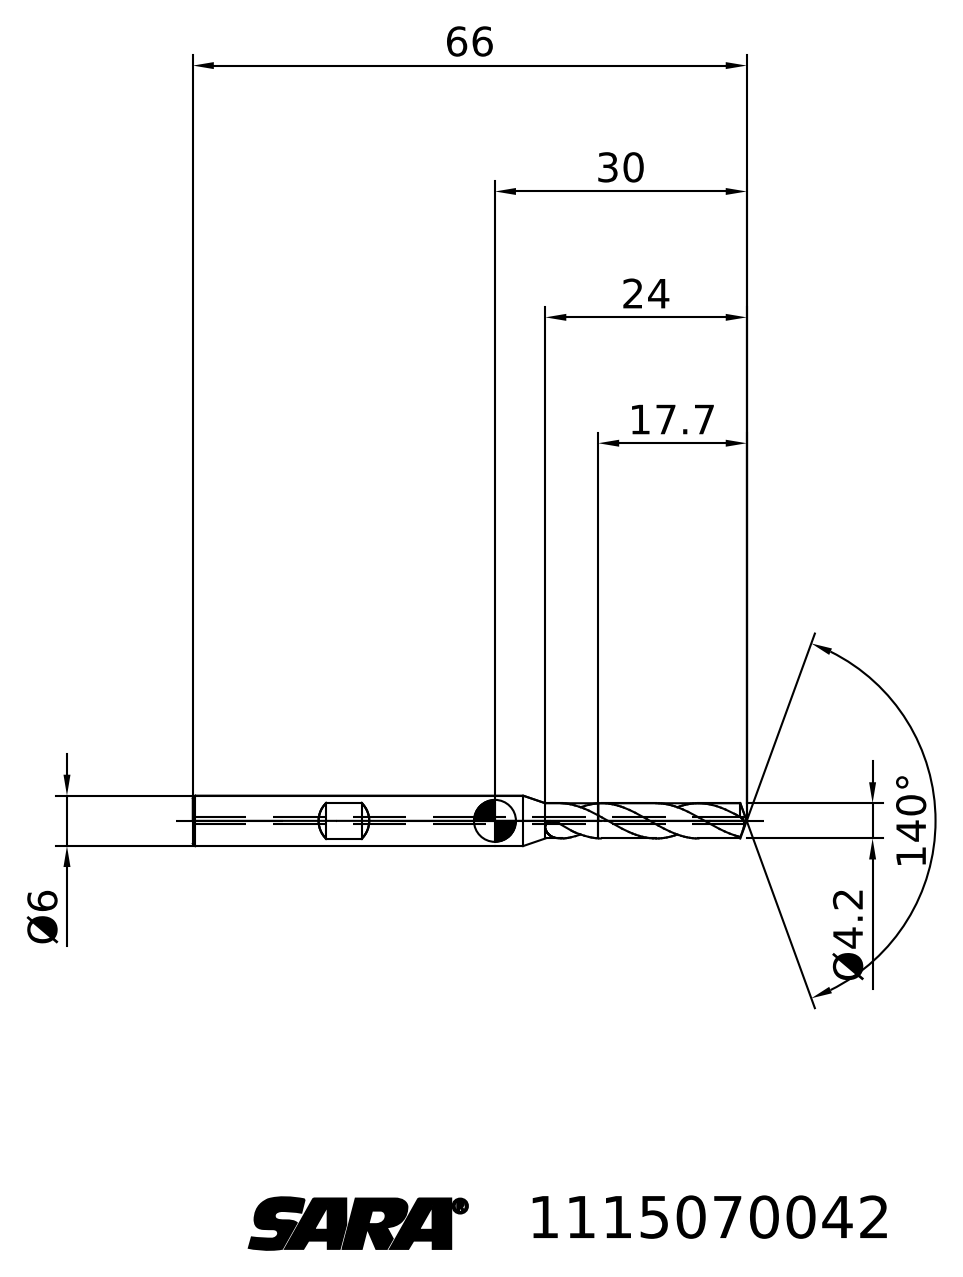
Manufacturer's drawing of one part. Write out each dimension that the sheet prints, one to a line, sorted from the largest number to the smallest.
140°
66
30
24
17.7
Ø6
Ø4.2
